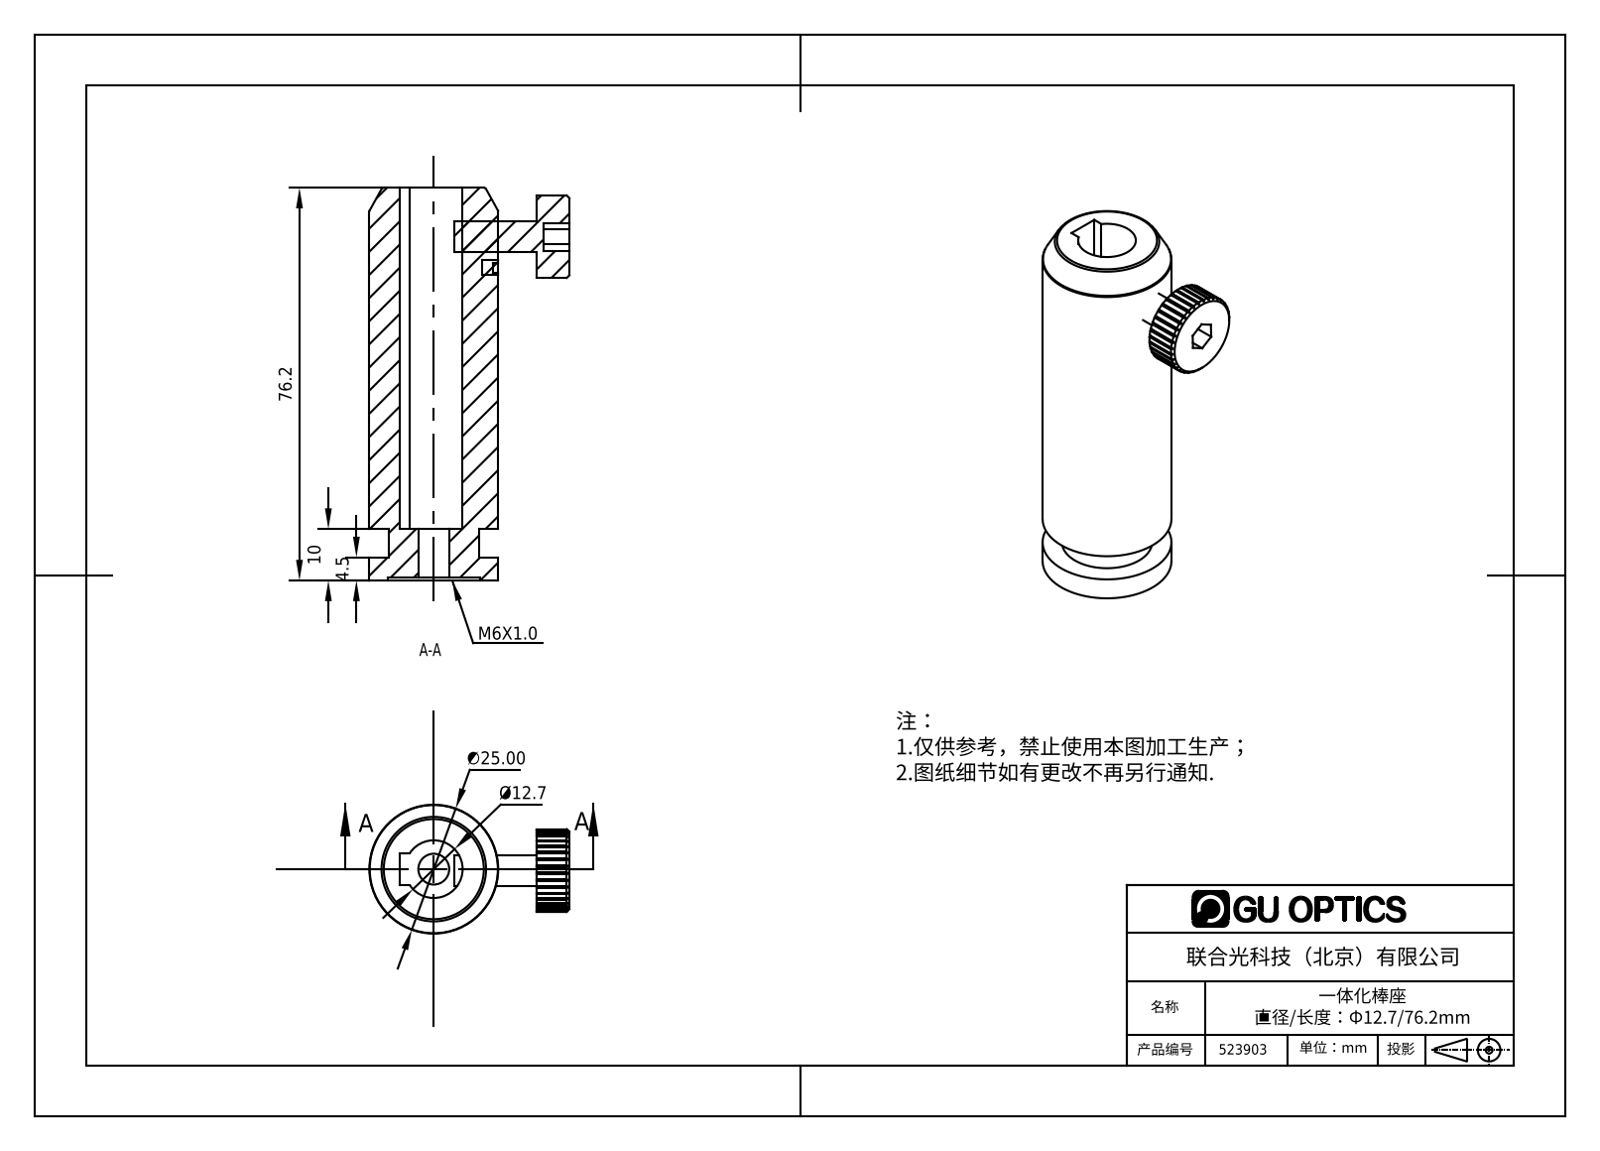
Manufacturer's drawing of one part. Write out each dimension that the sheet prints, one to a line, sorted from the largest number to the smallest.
76.2
∅25.00
Ø12.7
10
4.5
